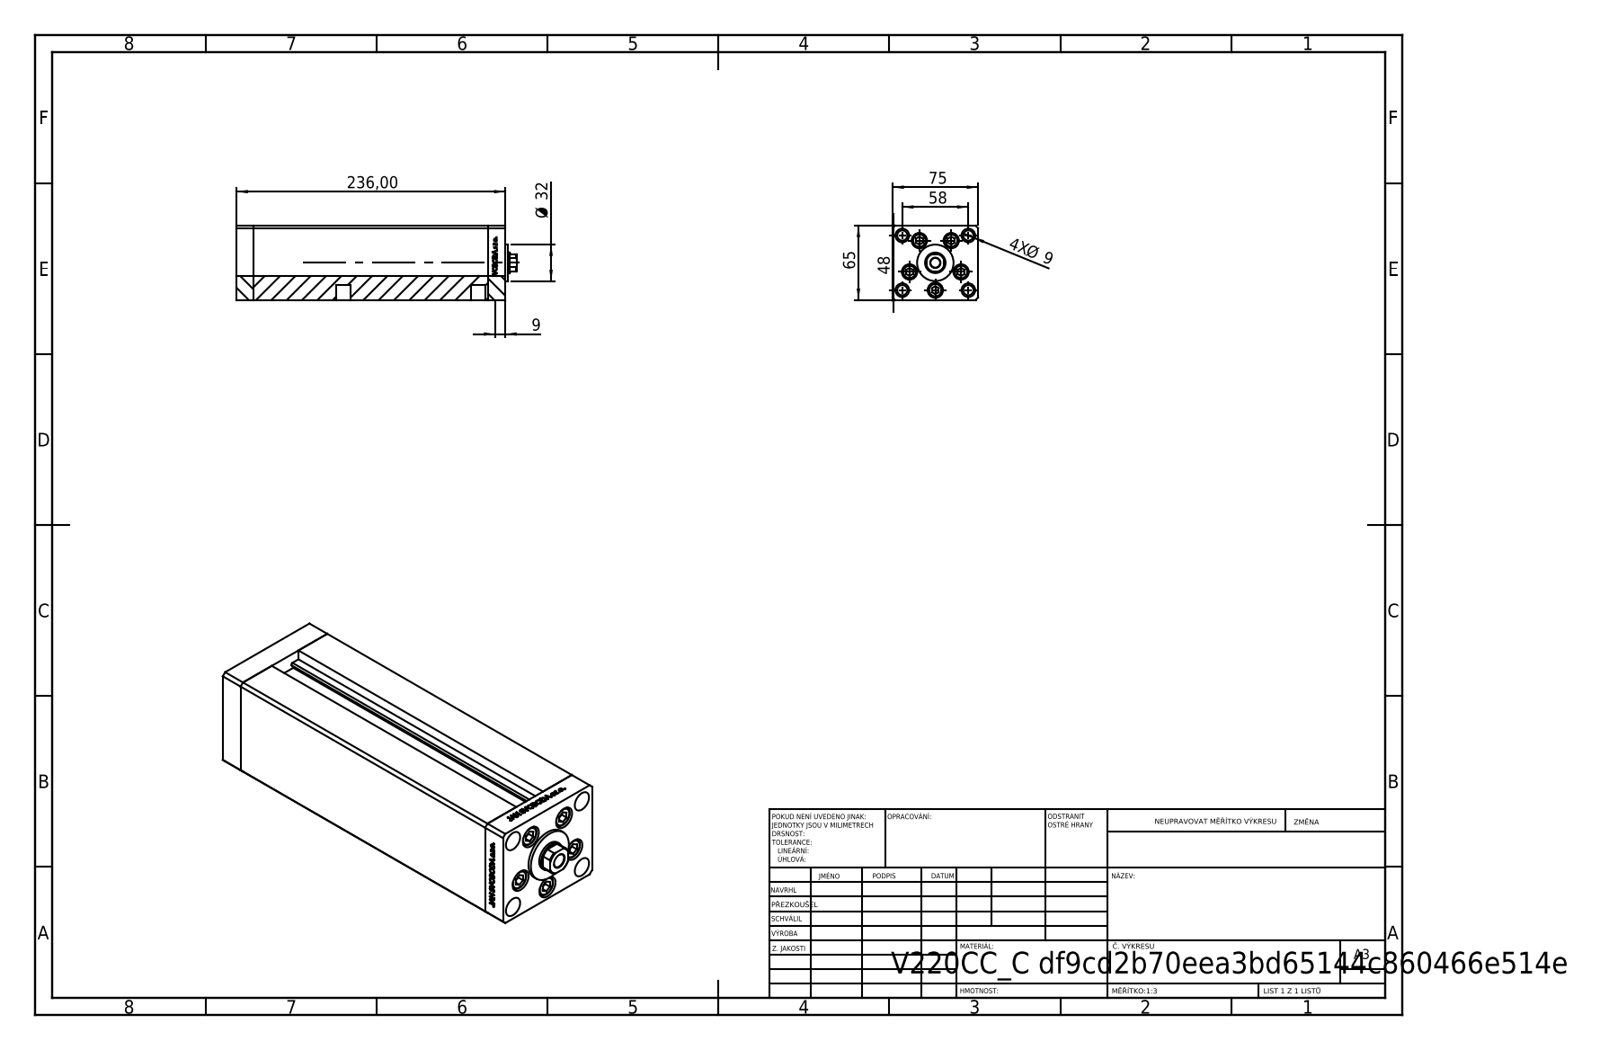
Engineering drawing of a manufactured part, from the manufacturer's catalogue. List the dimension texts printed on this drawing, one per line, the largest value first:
236,00
75
65
58
48
Ø 32
9
4X Ø 9
